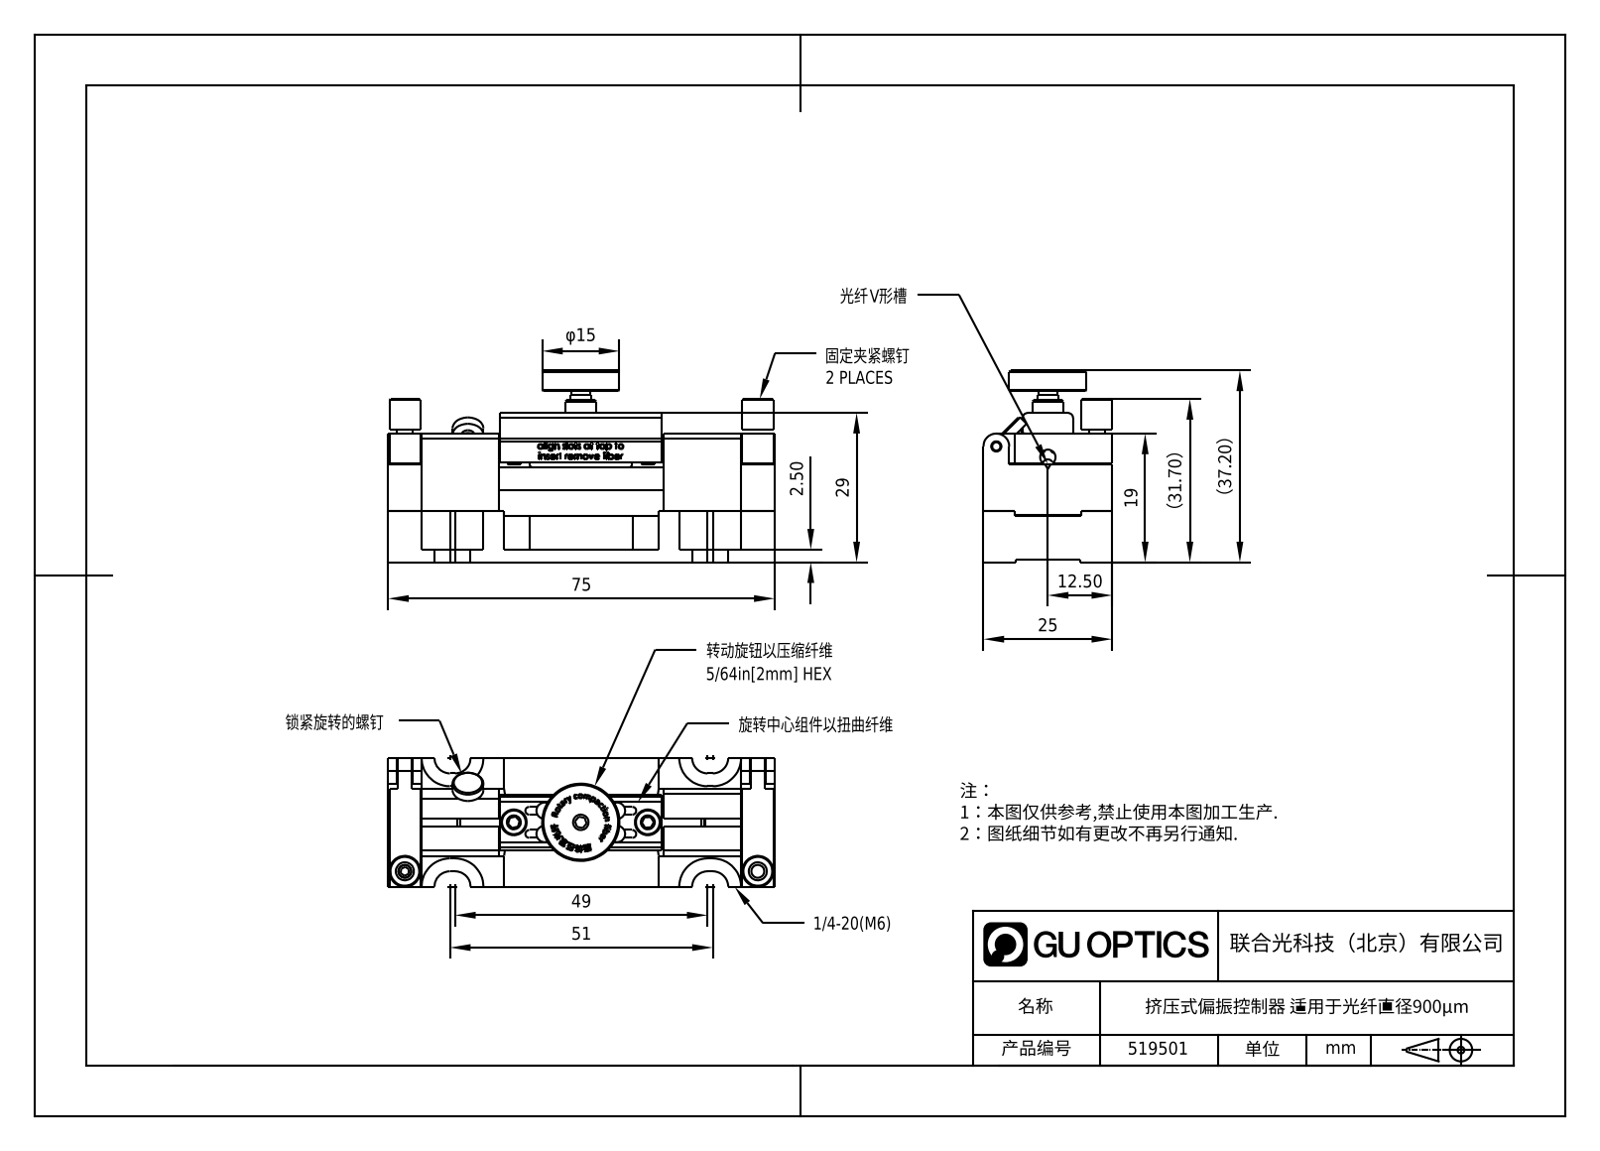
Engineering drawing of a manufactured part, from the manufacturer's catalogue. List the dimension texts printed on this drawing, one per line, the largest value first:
75
51
49
（37.20）
（31.70）
29
25
19
φ15
12.50
2.50
